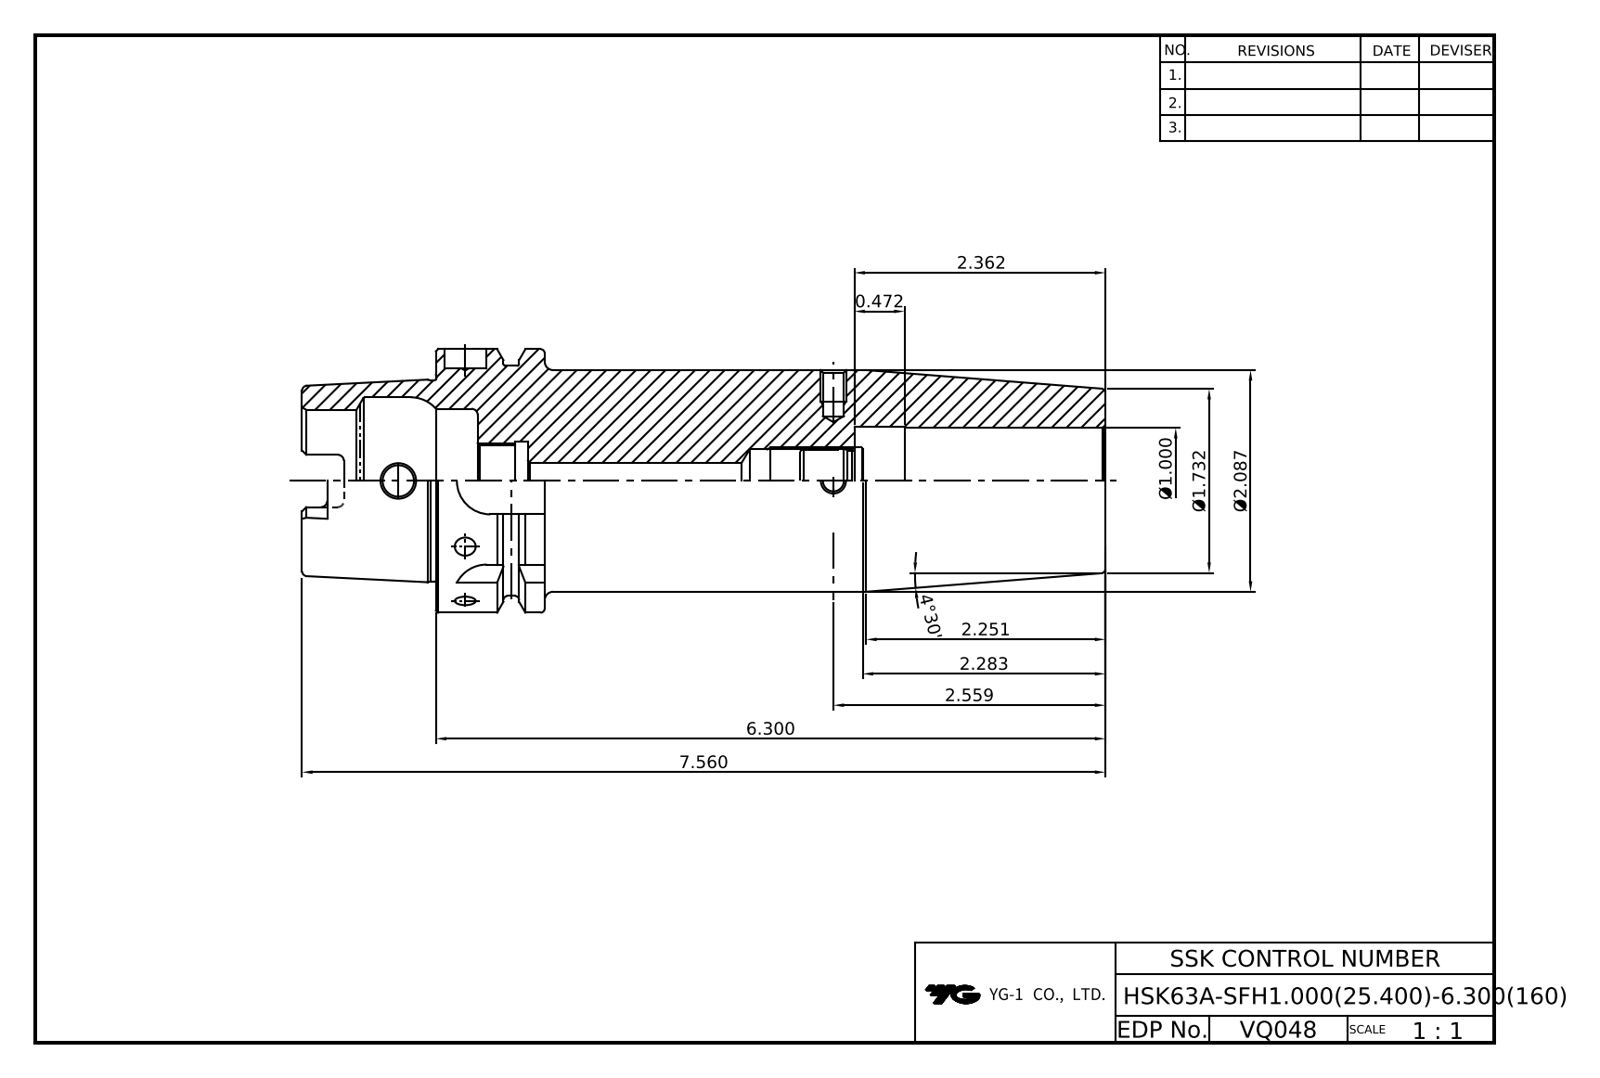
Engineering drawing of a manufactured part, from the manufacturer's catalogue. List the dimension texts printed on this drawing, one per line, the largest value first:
7.560
6.300
4°30'
2.559
2.362
2.283
2.251
Ø2.087
Ø1.732
0.472
